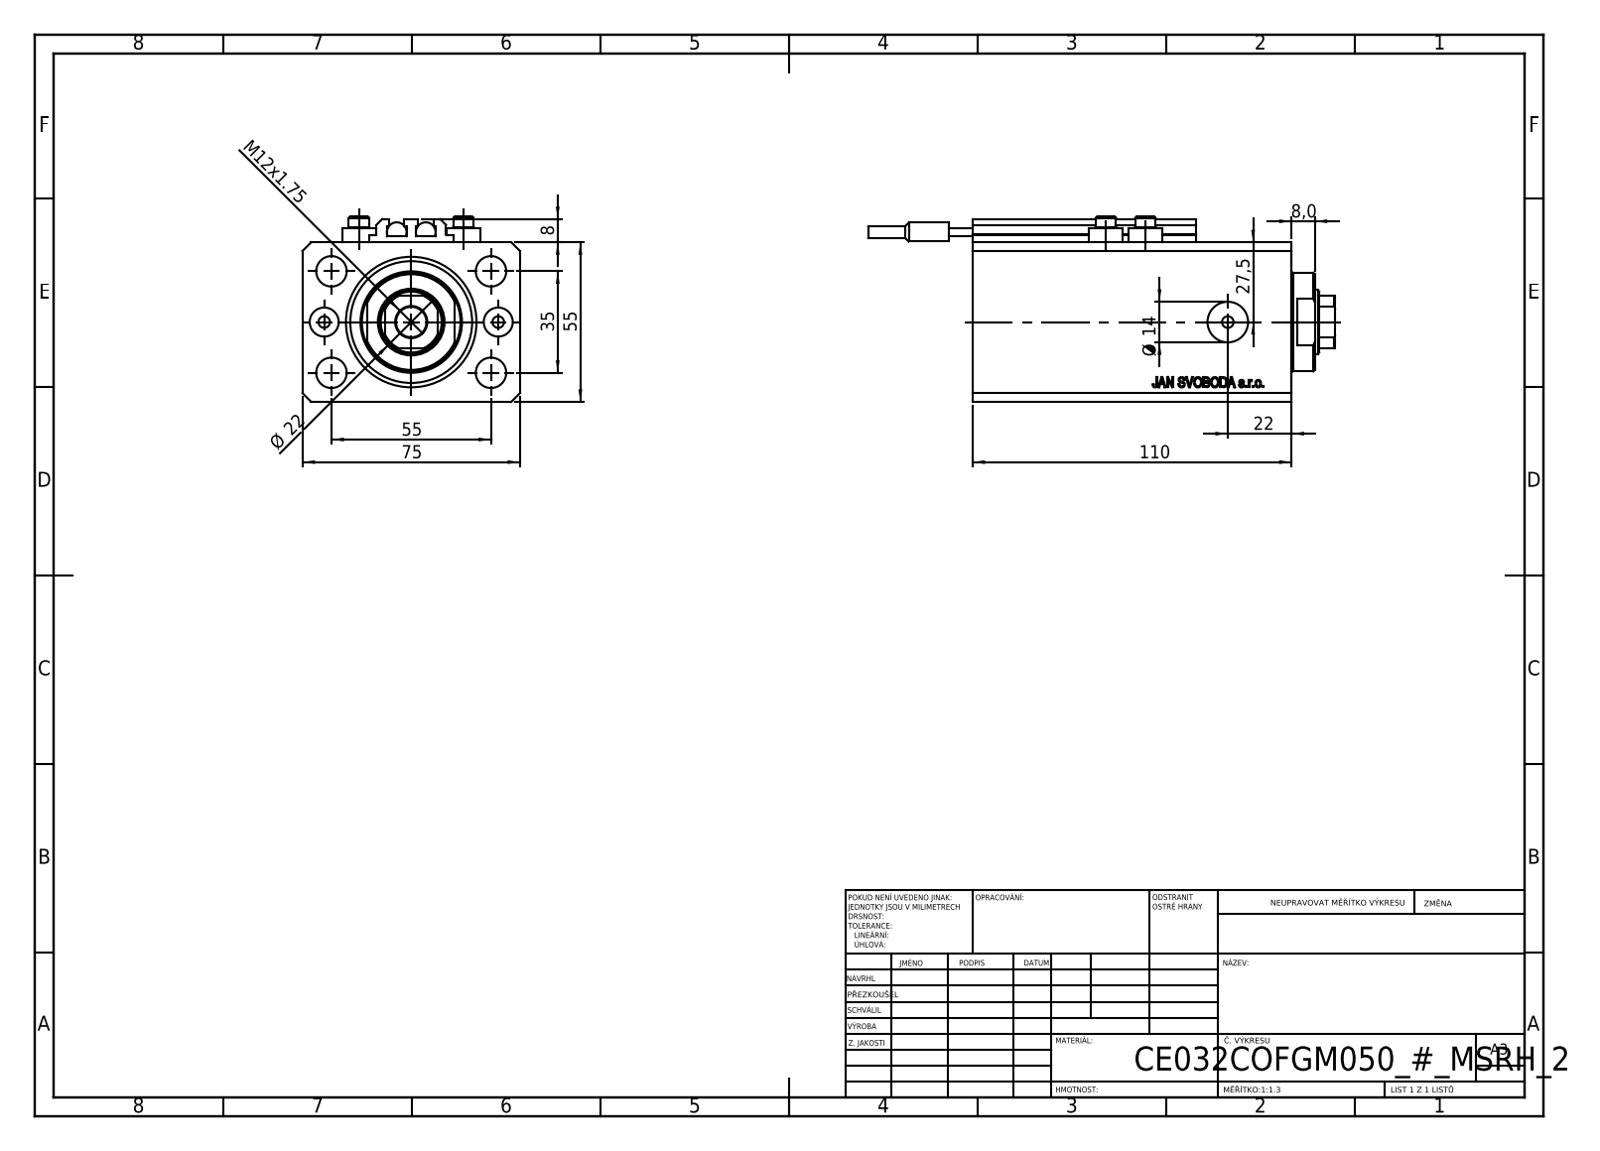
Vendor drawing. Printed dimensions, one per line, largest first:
110
75
55
55
35
27,5
Ø 22
22
Ø 14
M12x1.75
8
8,0
